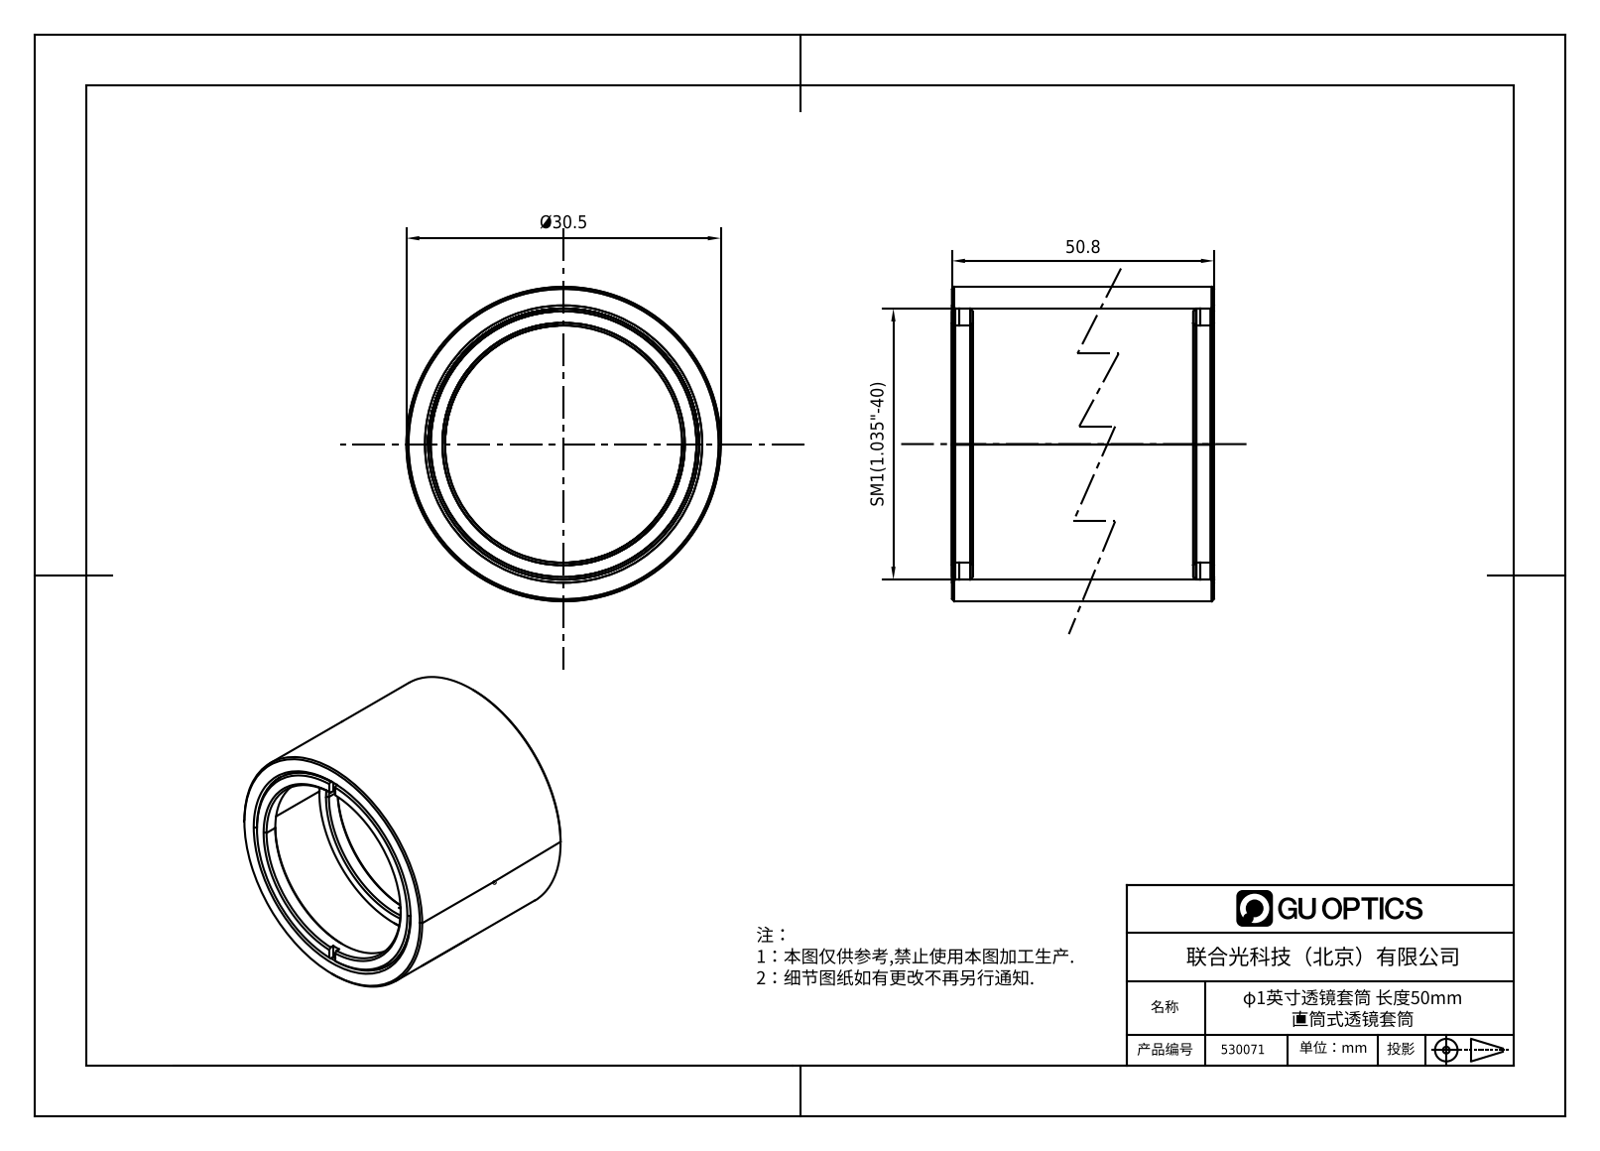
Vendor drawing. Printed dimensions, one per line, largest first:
50.8
Ø30.5
SM1(1.035"-40)
